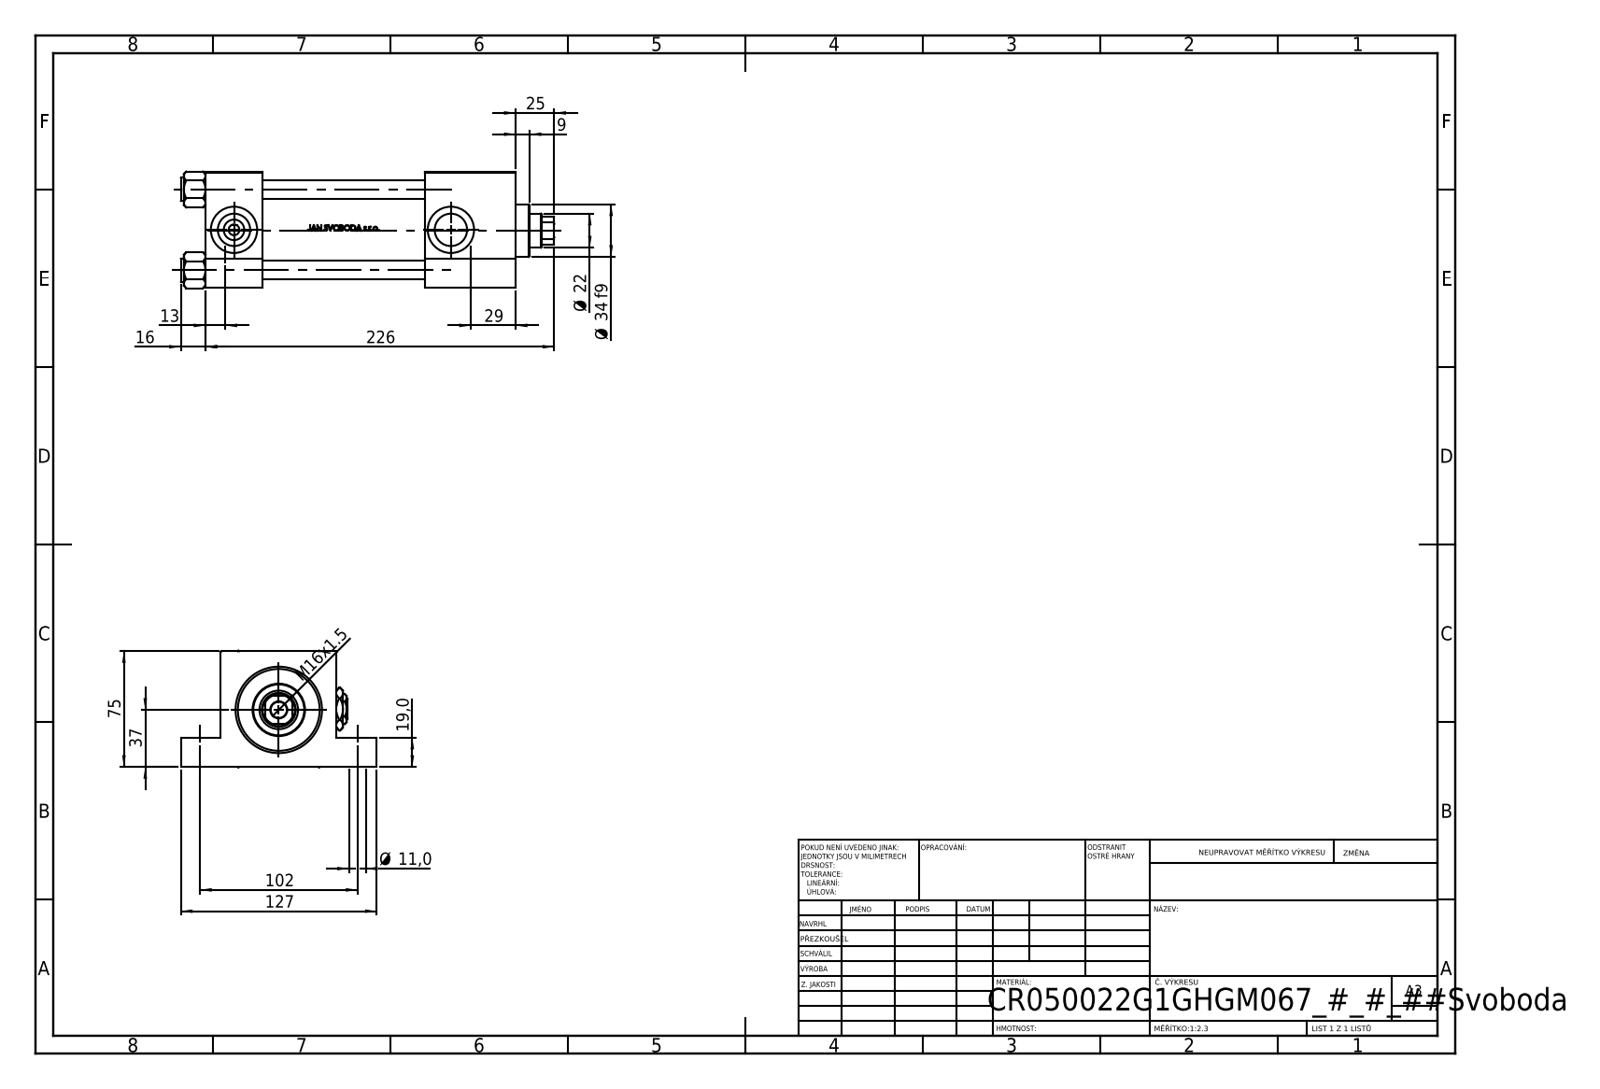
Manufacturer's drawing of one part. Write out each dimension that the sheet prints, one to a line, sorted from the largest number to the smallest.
226
127
102
75
37
Ø 34 f9
29
25
Ø 22
19,0
16
M16x1.5
13
Ø 11,0
9
